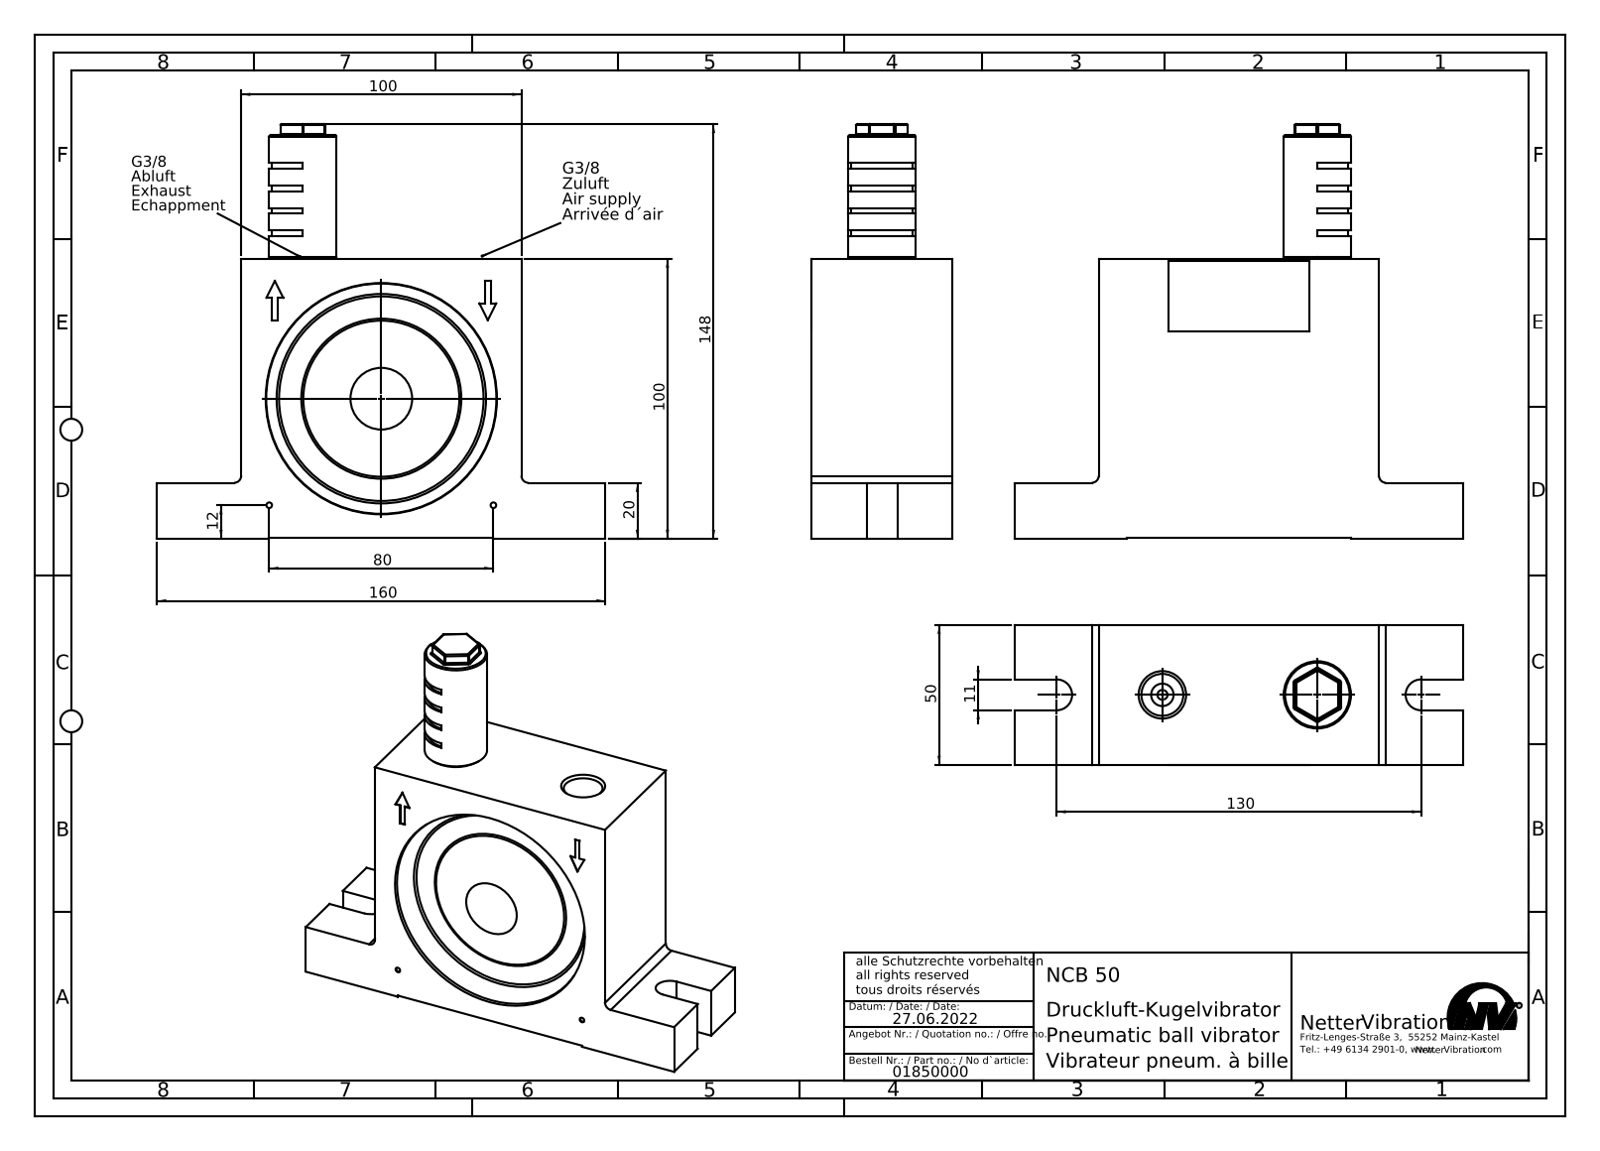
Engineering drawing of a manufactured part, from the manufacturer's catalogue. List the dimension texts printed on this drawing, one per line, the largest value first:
160
148
130
100
100
80
50
20
12
11
